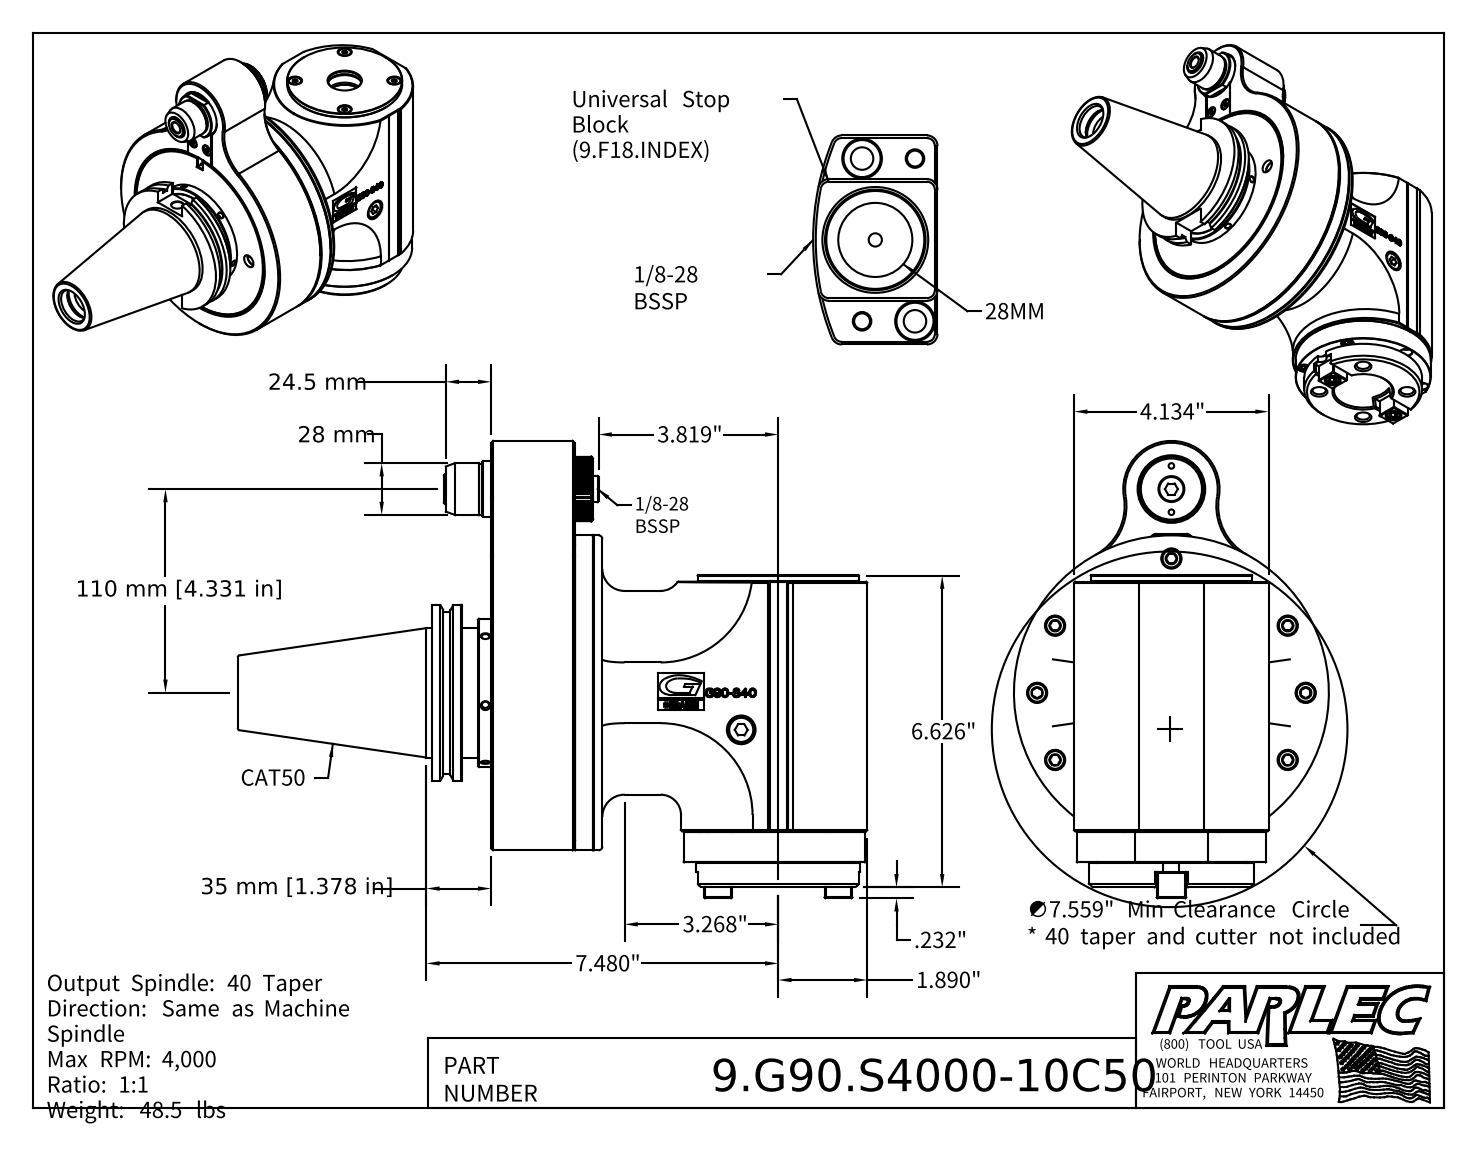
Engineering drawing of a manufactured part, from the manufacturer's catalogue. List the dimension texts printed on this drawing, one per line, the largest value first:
110 mm [4.331 in]
35 mm [1.378 in]
28 mm
24.5 mm
∅7.559" Min Clearance Circle * 40 taper and cutter not included
7.480"
6.626"
4.134"
3.819"
3.268"
1.890"
.232"
